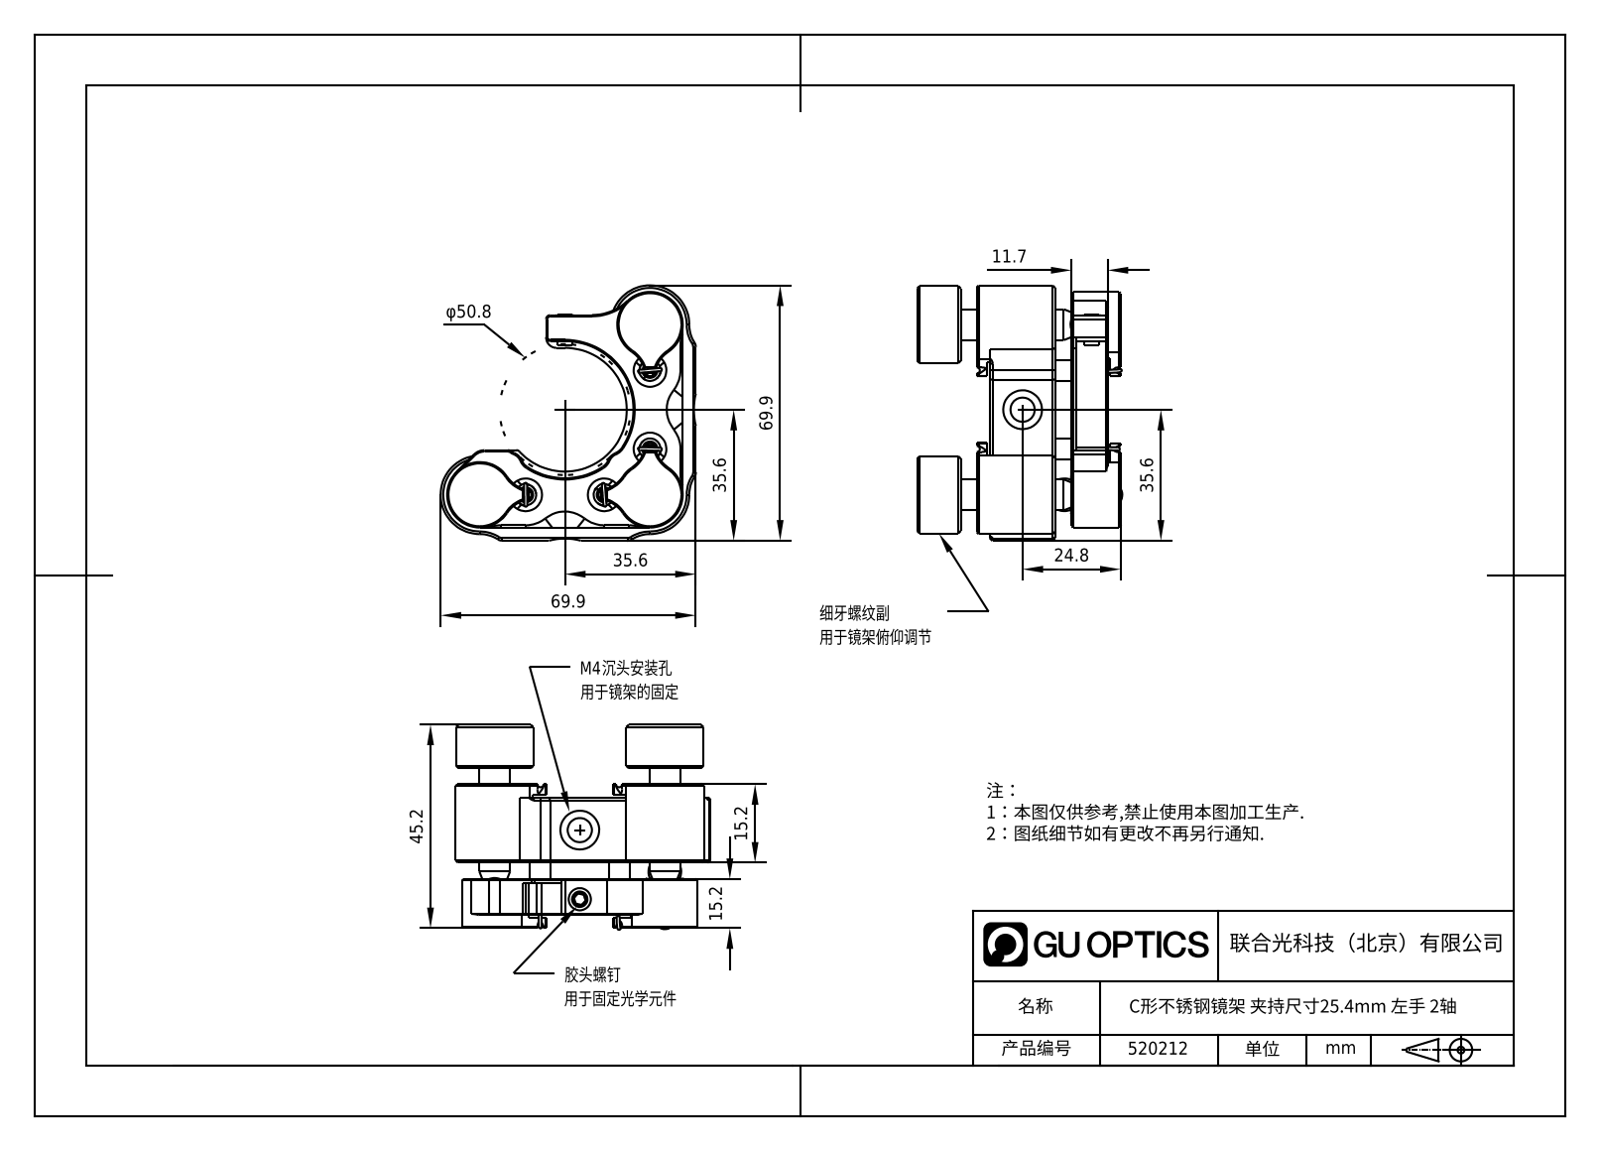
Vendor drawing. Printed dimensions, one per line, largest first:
69.9
69.9
45.2
35.6
35.6
35.6
24.8
15.2
15.2
11.7
